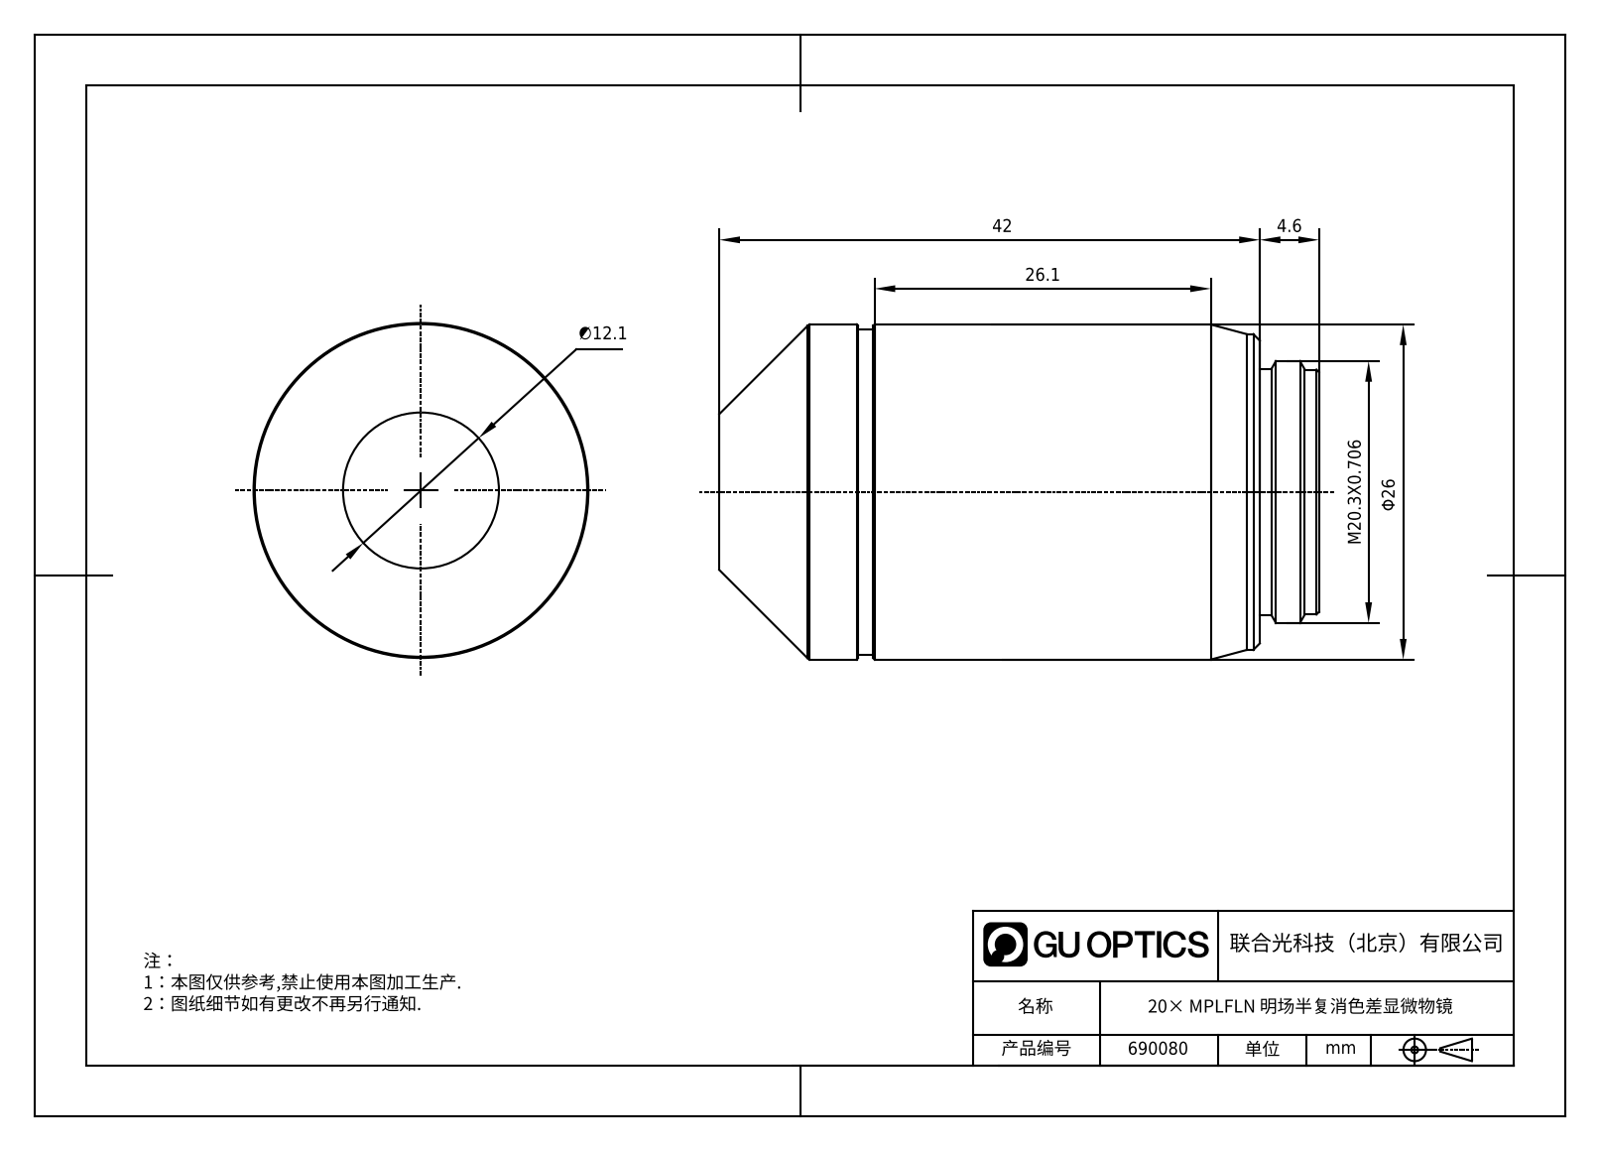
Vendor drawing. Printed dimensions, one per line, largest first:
42
26.1
Φ26
M20.3X0.706
∅12.1
4.6
